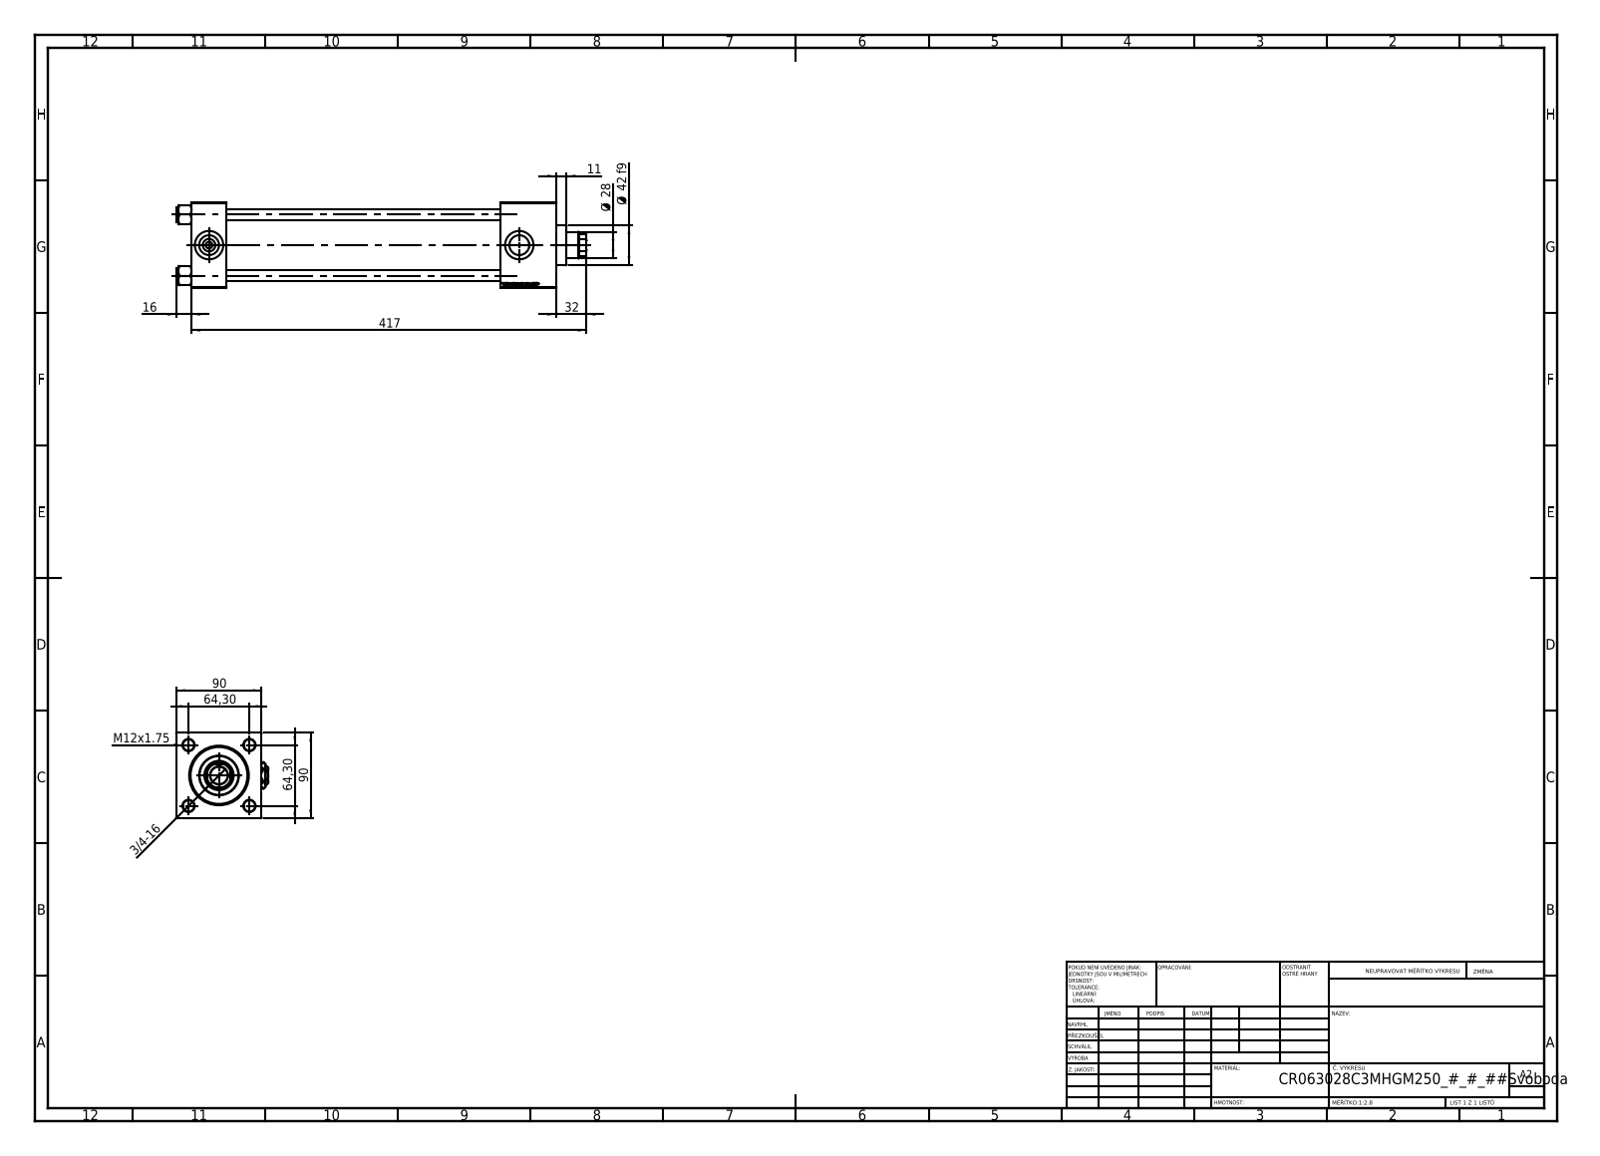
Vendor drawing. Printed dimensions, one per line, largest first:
417
90
90
64,30
64,30
Ø 42 f9
32
Ø 28
16
M12x1.75
11
3/4-16
